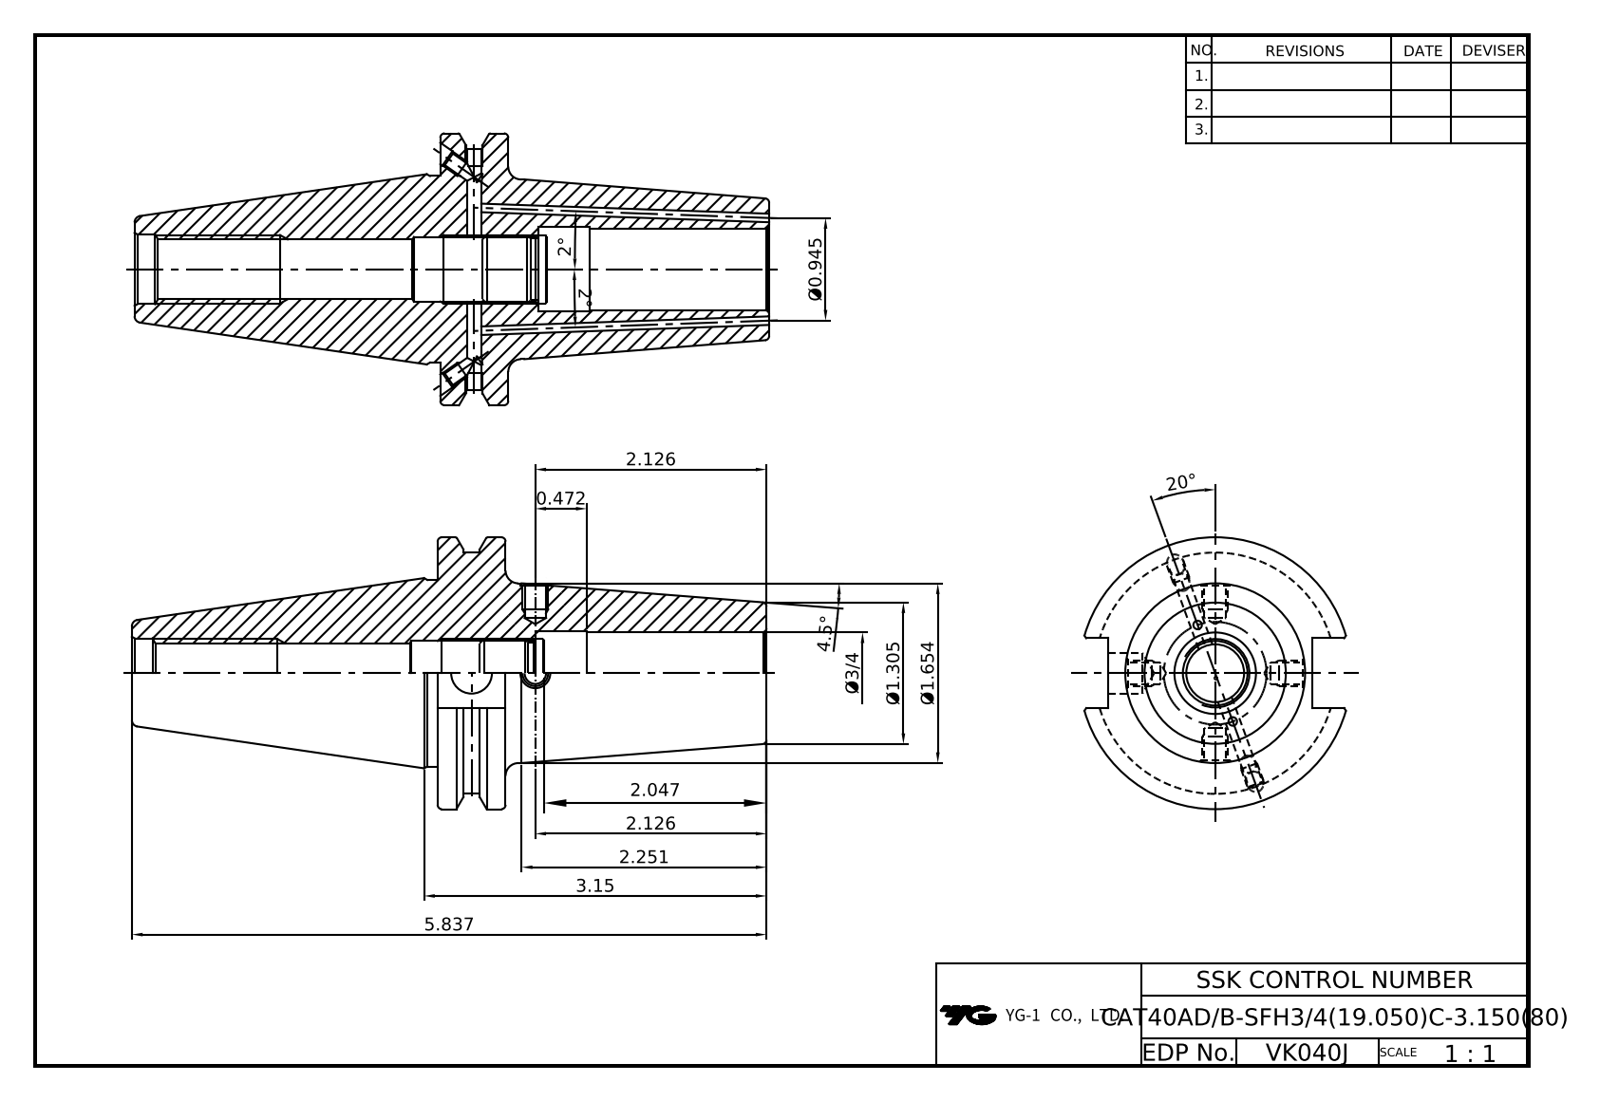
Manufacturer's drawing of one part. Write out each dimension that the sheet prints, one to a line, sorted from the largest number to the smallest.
20°
5.837
4.5°
3.15
2.251
2.126
2.126
2.047
2°
2°
Ø1.654
Ø1.305
Ø0.945
0.472
